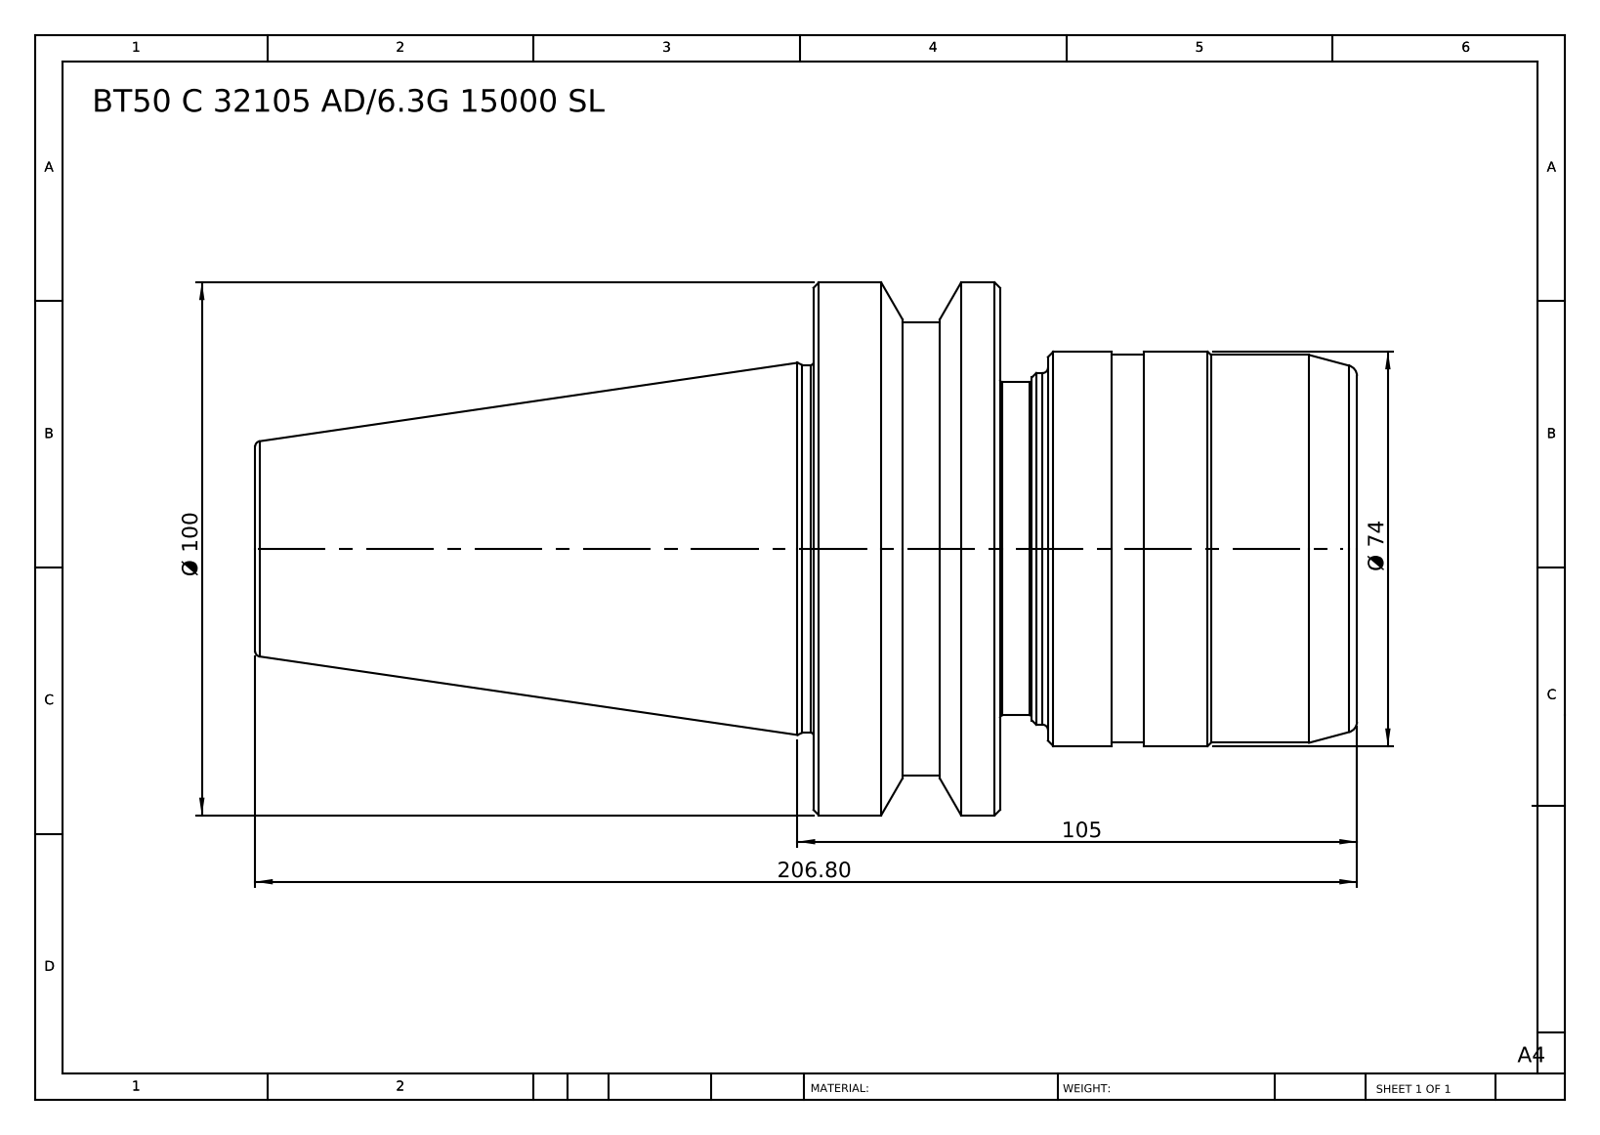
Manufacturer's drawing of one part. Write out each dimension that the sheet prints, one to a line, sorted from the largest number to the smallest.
206.80
105
Ø 100
Ø 74
